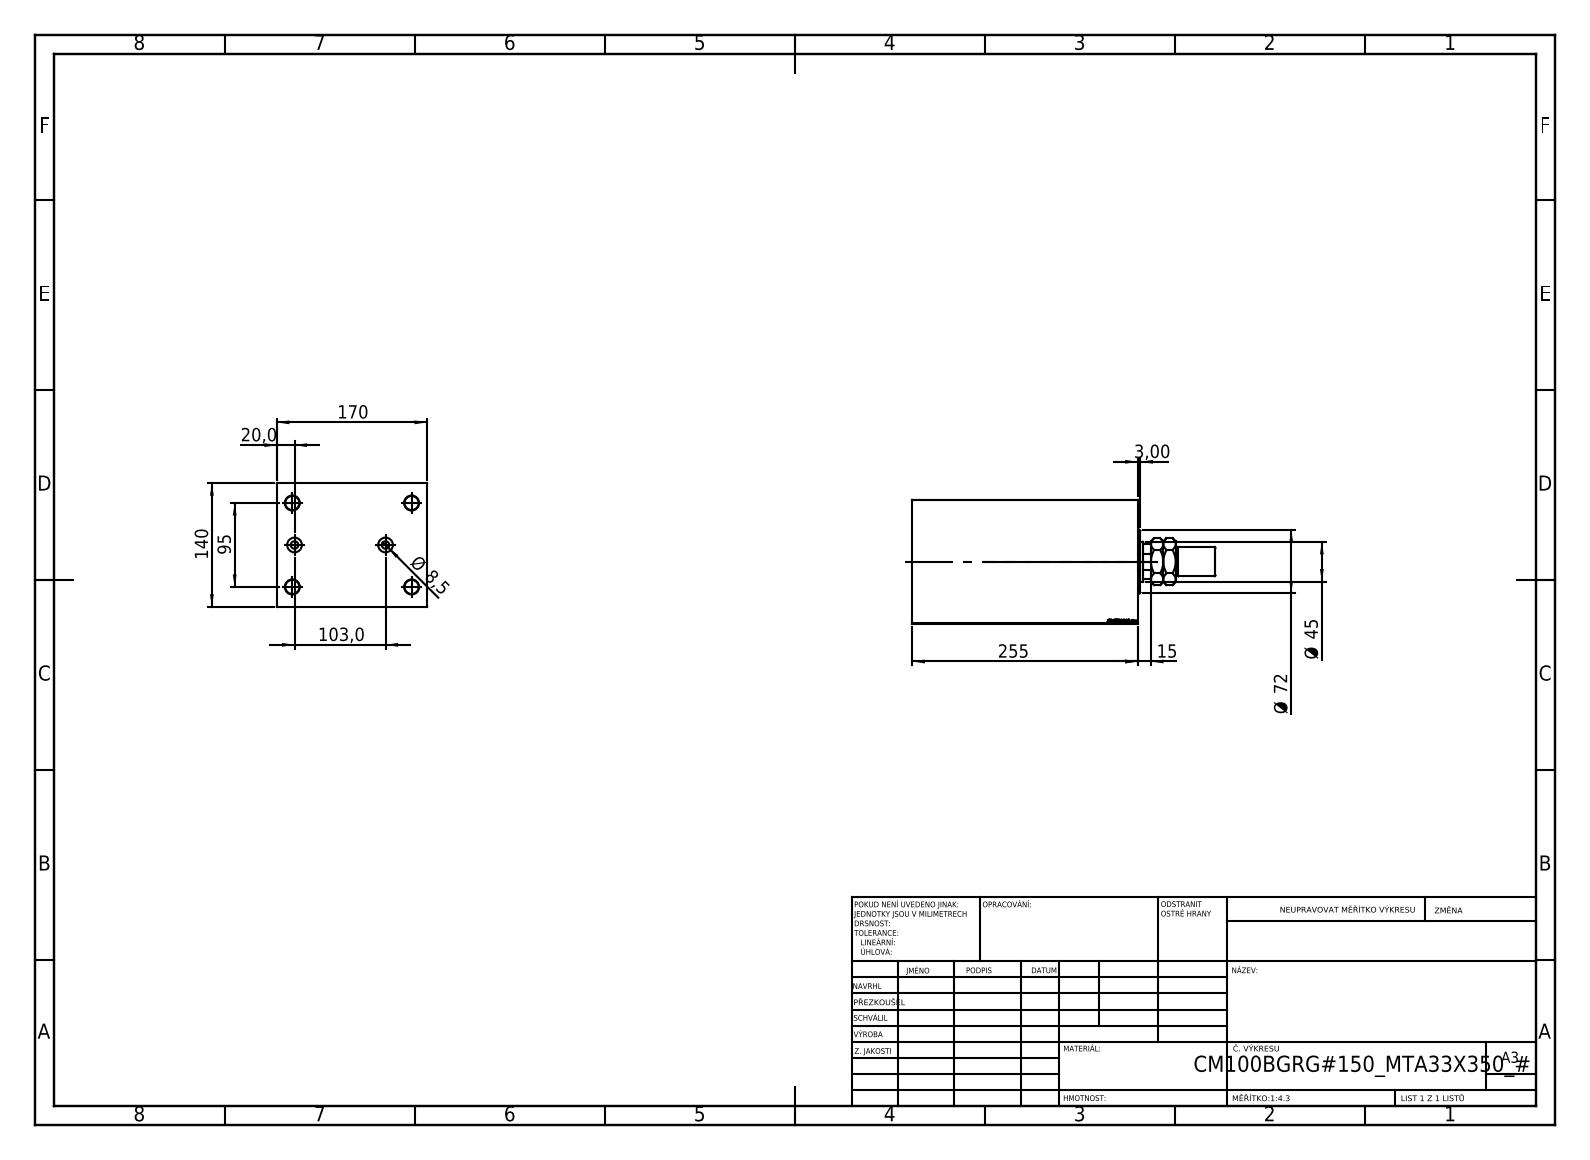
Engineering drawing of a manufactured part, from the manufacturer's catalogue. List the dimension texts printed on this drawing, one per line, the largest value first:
255
170
140
103,0
95
Ø 72
Ø 45
20,0
15
Ø 8,5
3,00
